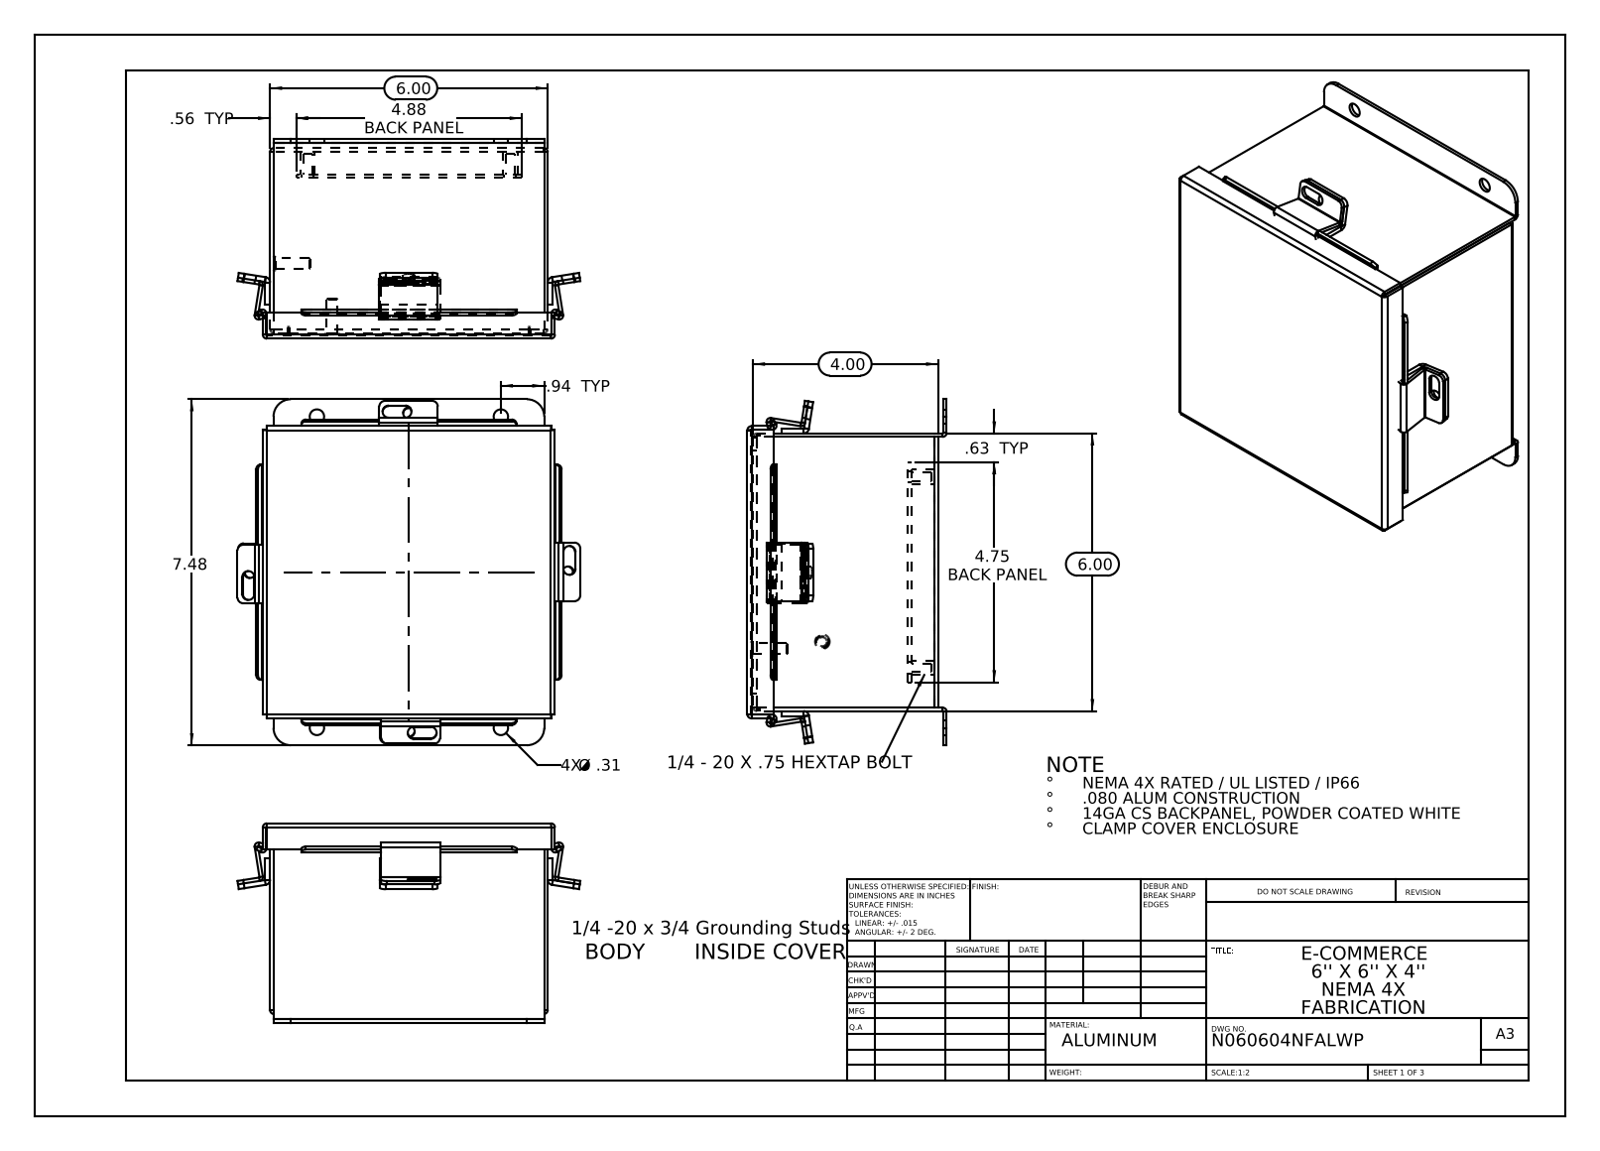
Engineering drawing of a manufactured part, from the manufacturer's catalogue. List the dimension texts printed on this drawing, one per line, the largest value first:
7.48
6.00
6.00
4.88 BACK PANEL
4.75 BACK PANEL
4.00
.94 TYP
.63 TYP
.56 TYP
4X Ø .31
